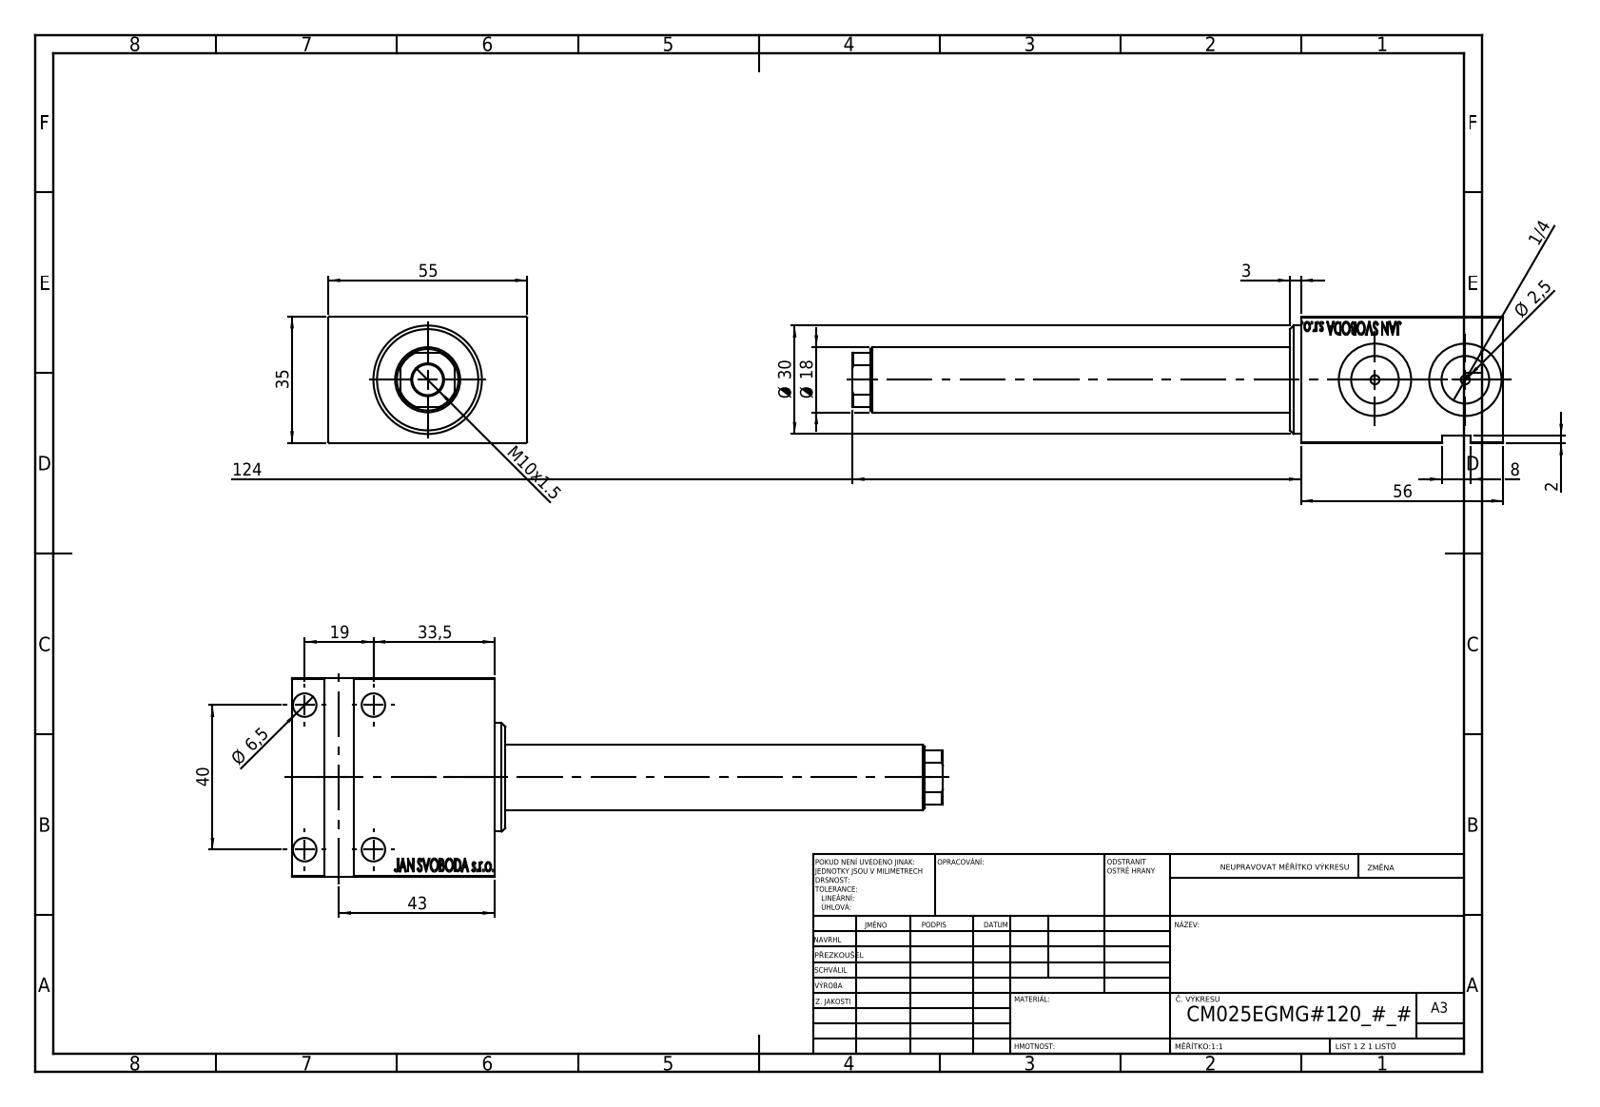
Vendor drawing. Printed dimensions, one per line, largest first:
124
56
55
43
40
35
33,5
Ø 30
19
Ø 18
M10x1.5
8
Ø 6,5
3
Ø 2,5
2
1/4
